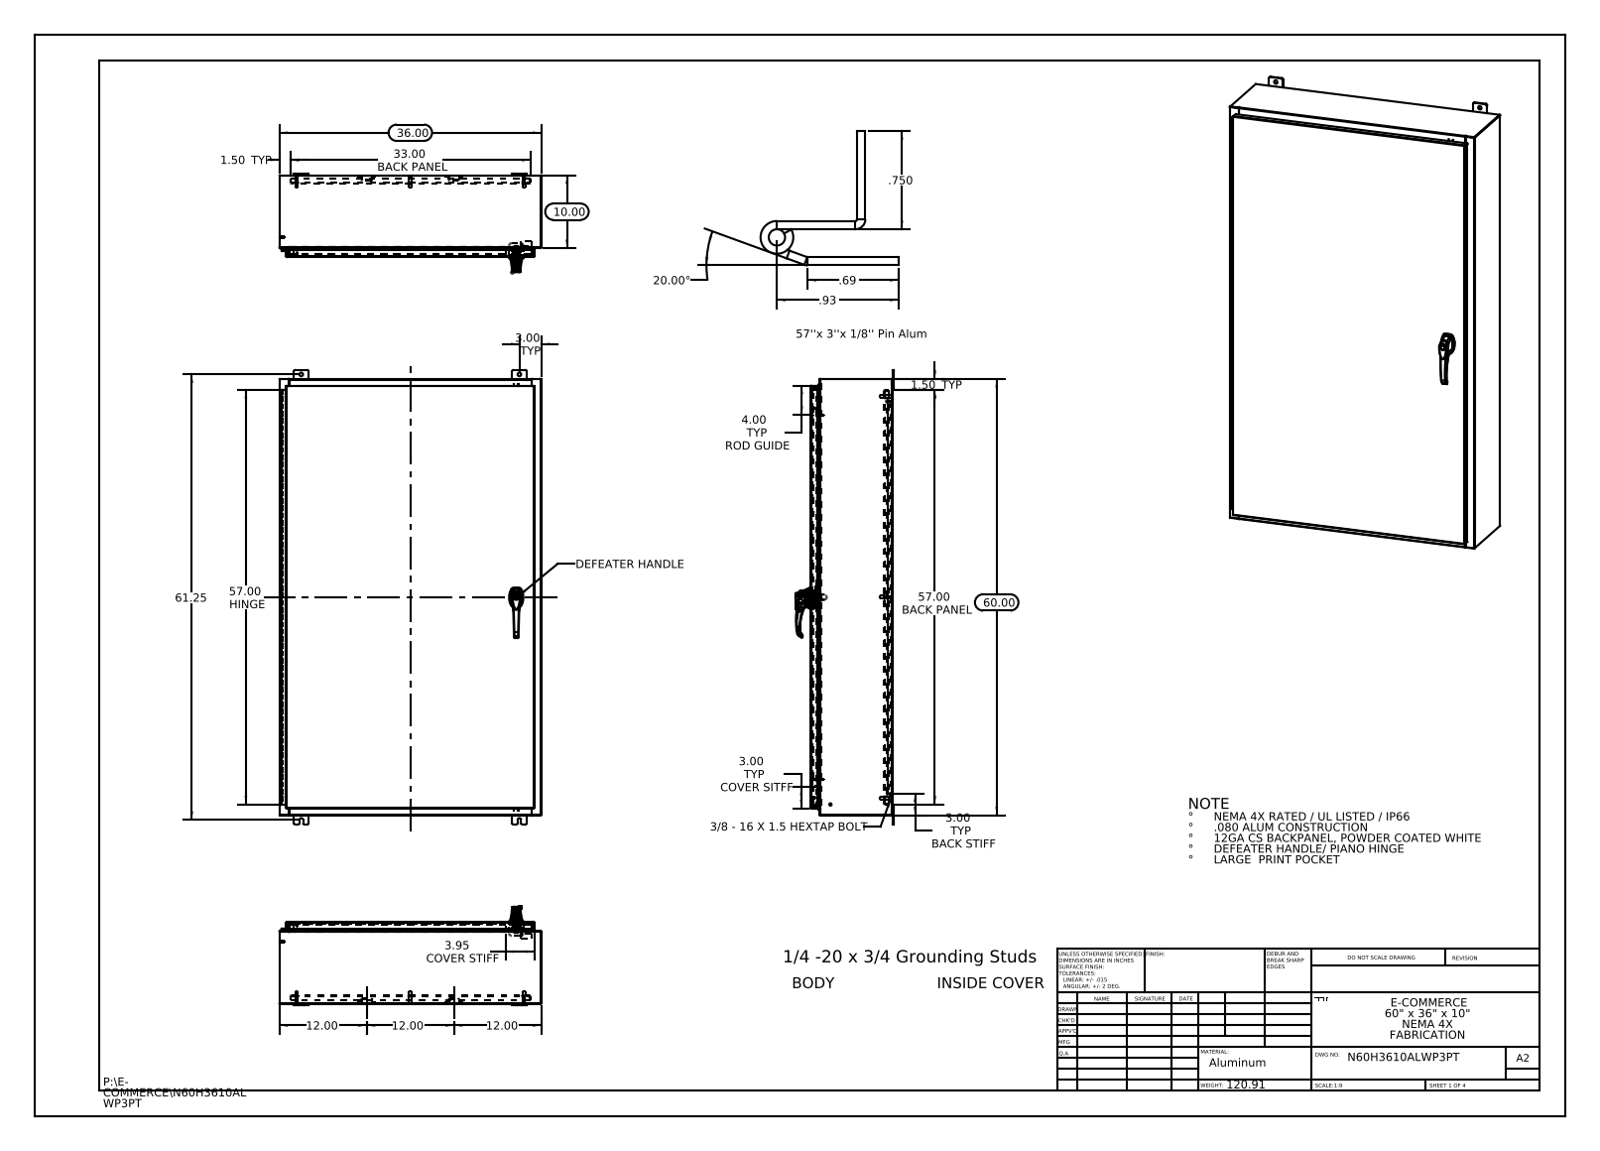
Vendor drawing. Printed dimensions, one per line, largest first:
61.25
60.00
57.00 HINGE
57.00 BACK PANEL
36.00
33.00 BACK PANEL
20.00°
12.00
12.00
12.00
10.00
4.00 TYP ROD GUIDE
3.95 COVER STIFF
3.00 TYP
3.00 TYP BACK STIFF
3.00 TYP COVER SITFF
1.50 TYP
1.50 TYP
.93
.750
.69
